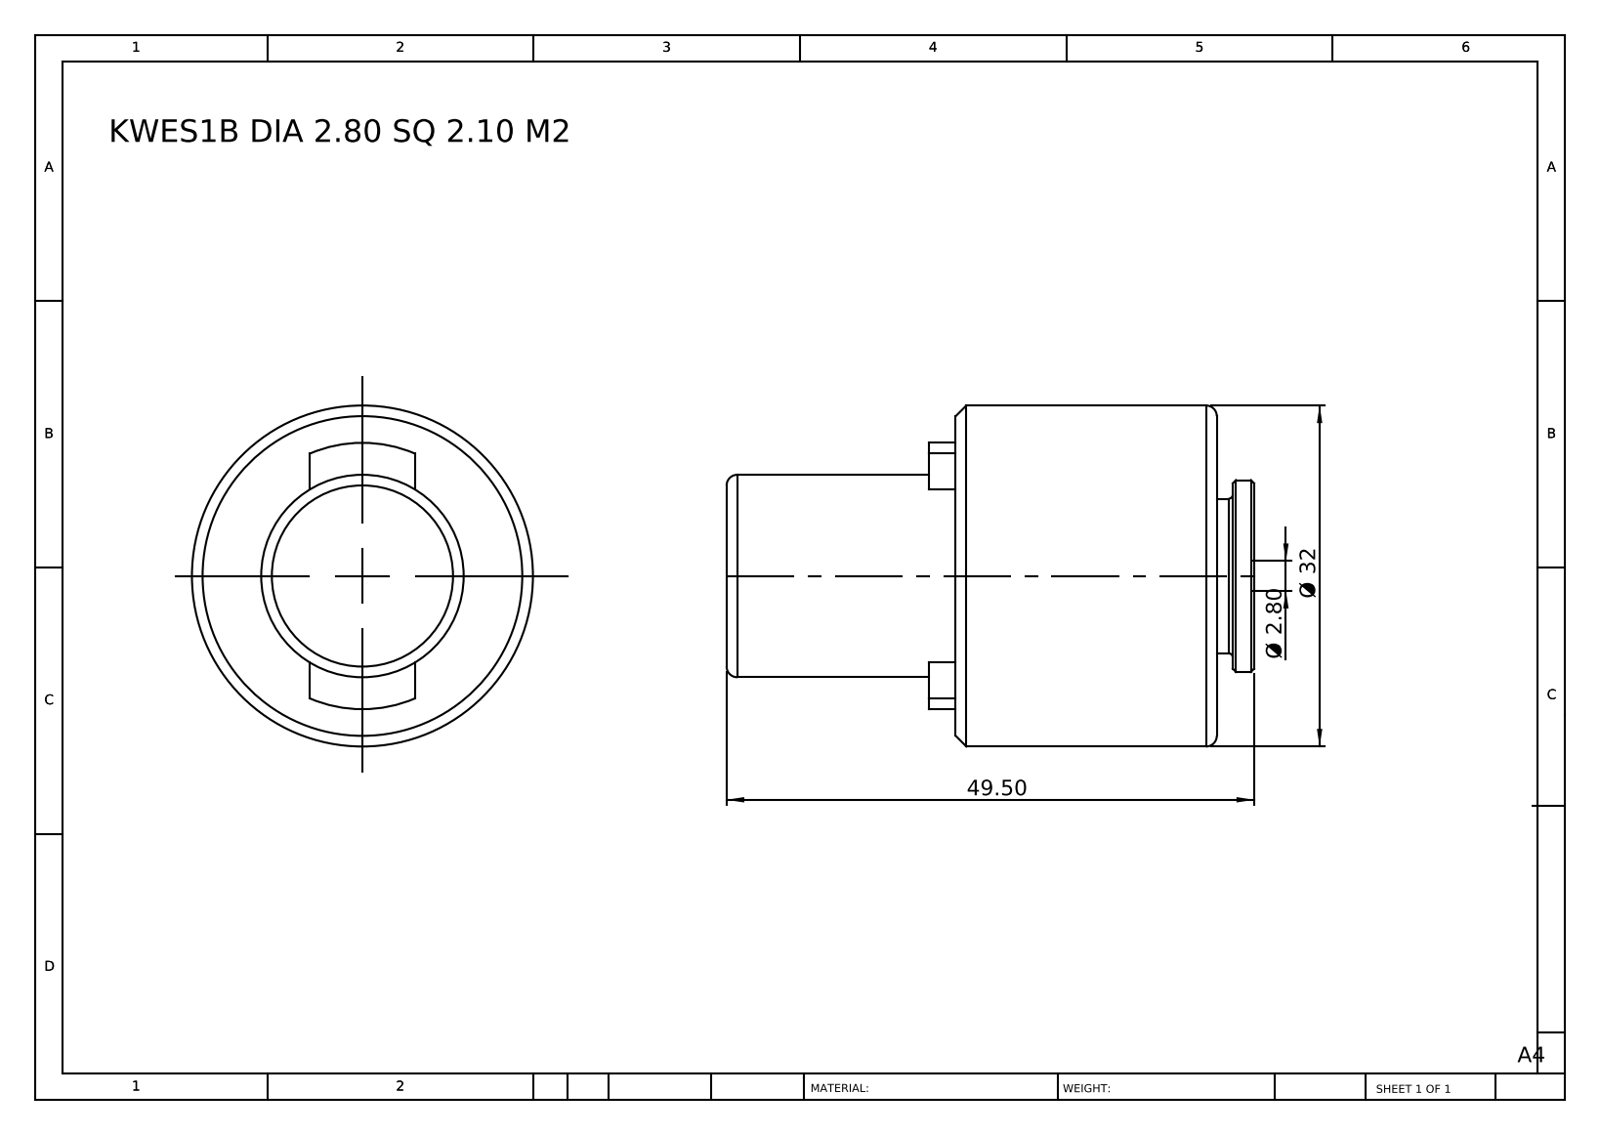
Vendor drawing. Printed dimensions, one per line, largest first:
49.50
Ø 32
Ø 2.80
